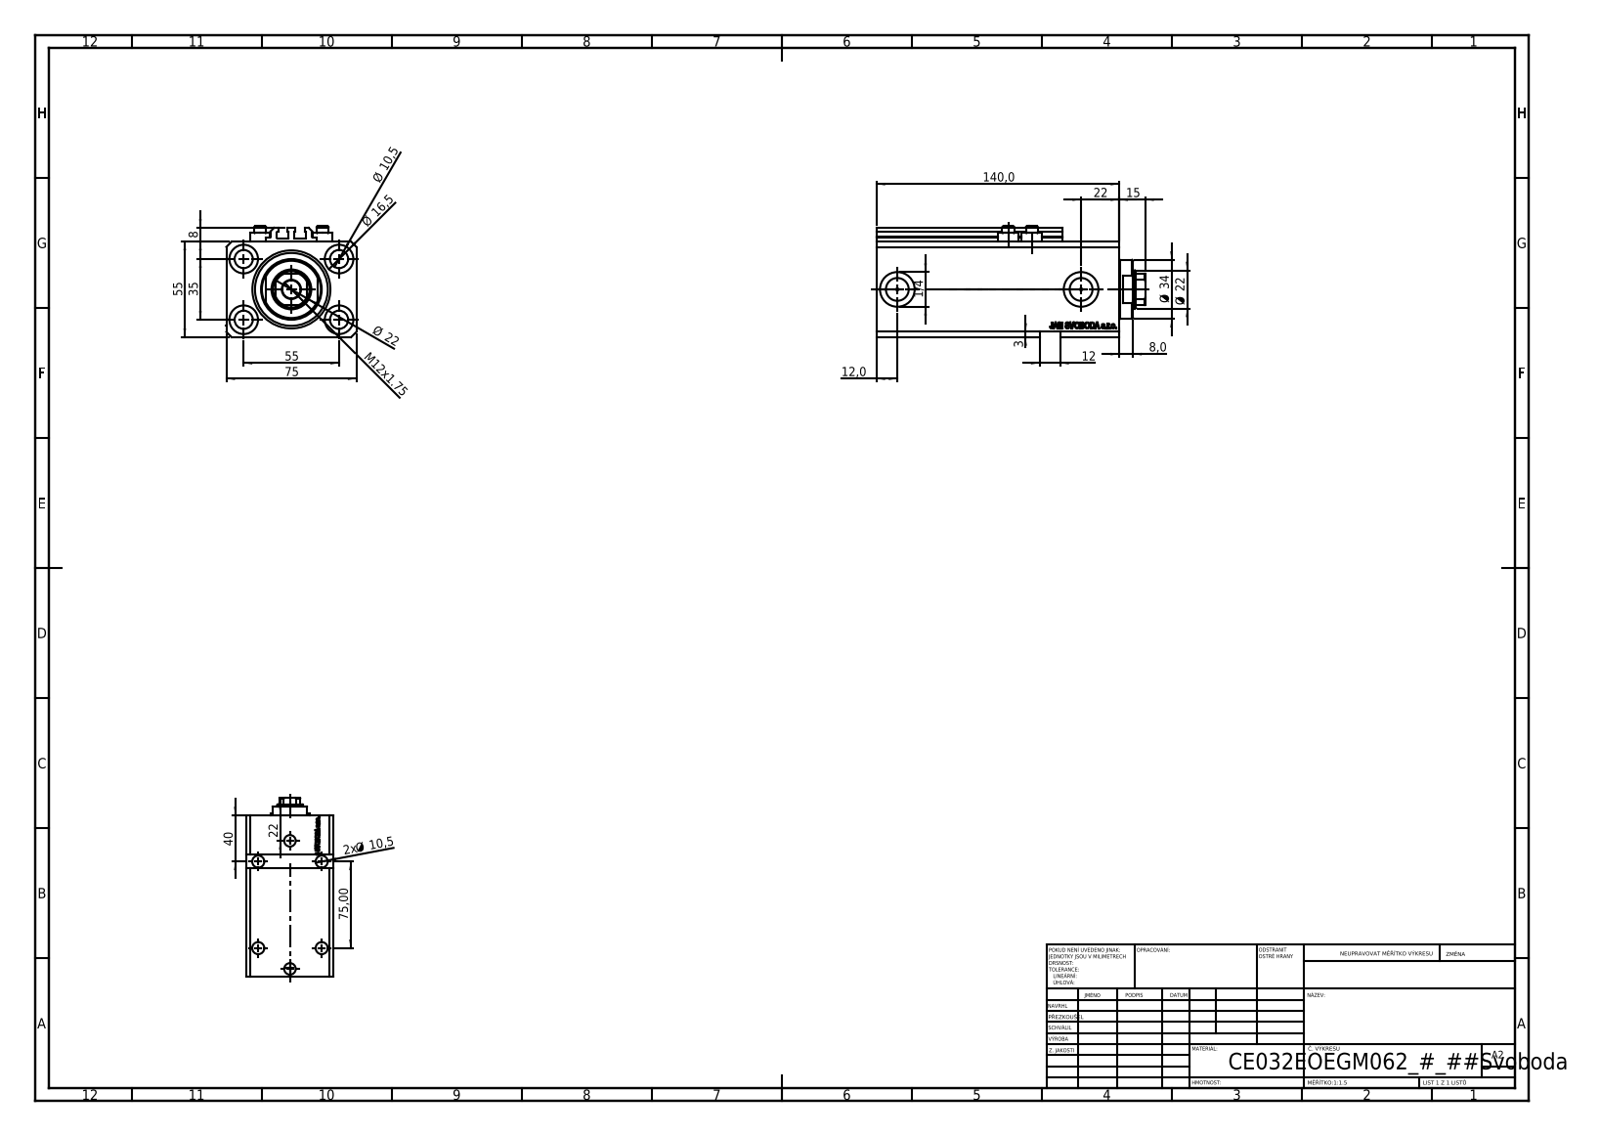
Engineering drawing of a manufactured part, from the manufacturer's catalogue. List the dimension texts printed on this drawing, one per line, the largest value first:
140,0
75
75,00
55
55
40
35
Ø 34
Ø 22
22
Ø 22
22
Ø 16,5
15
M12x1.75
12,0
12
Ø 10,5
2x Ø 10,5
8
8,0
3
1/4
